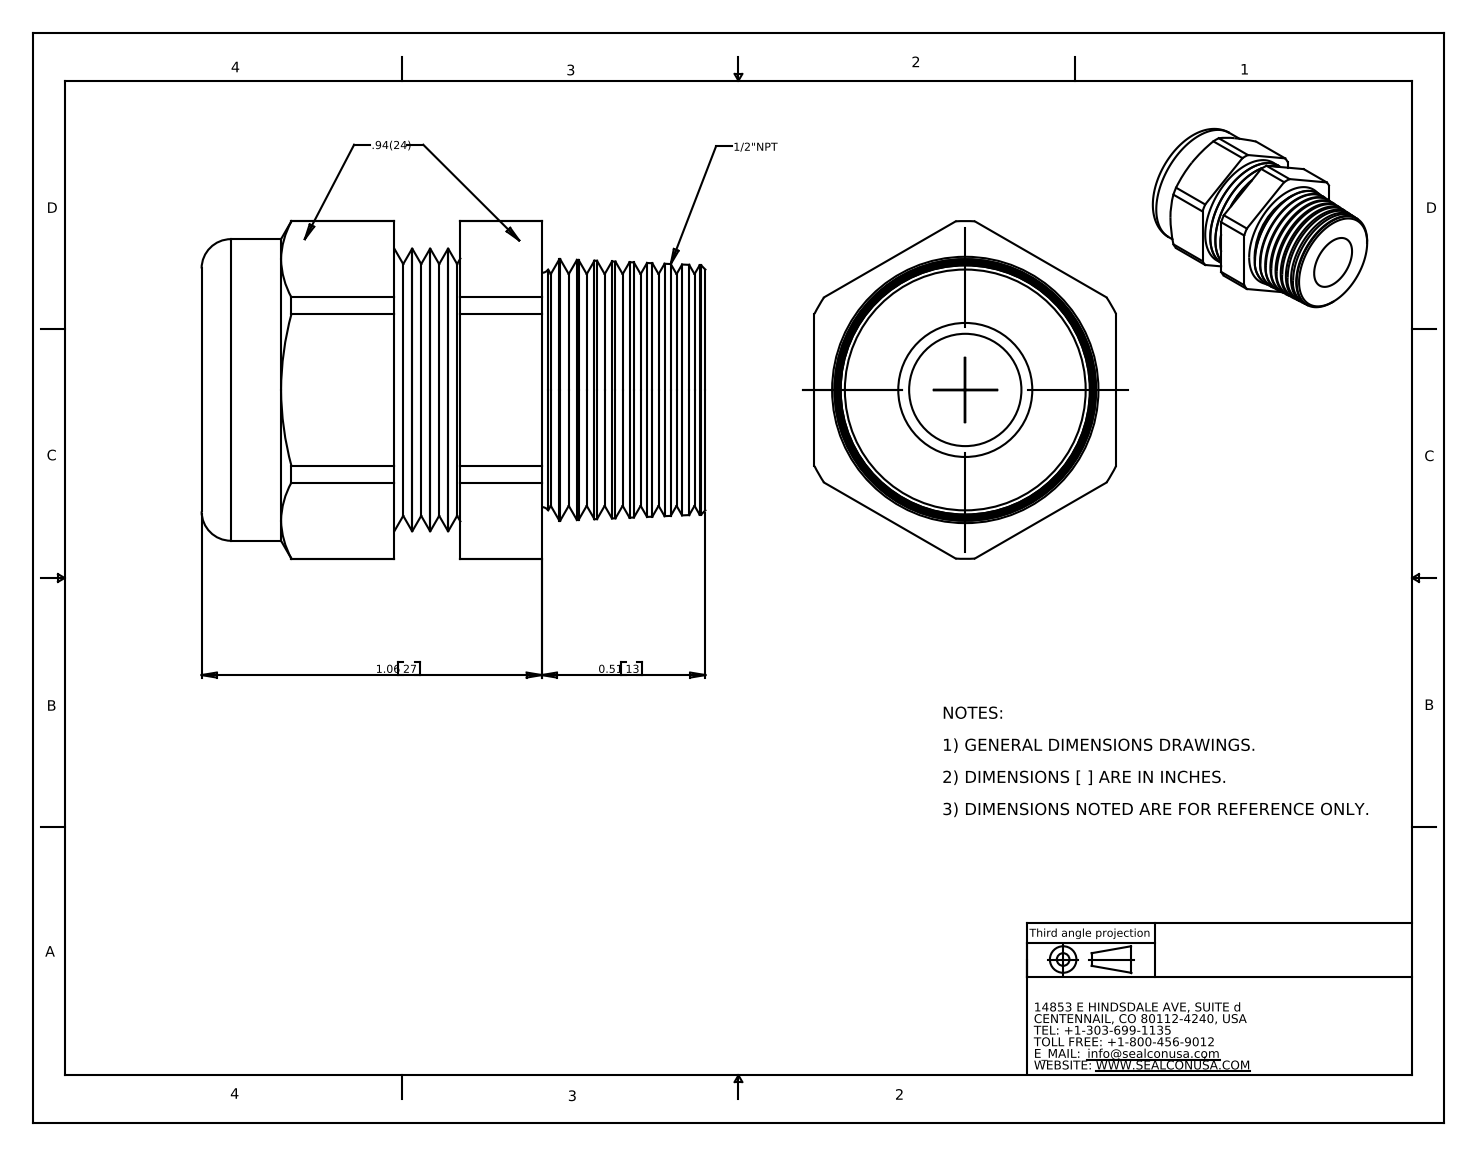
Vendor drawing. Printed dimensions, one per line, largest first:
1.06 27
0.51 13
